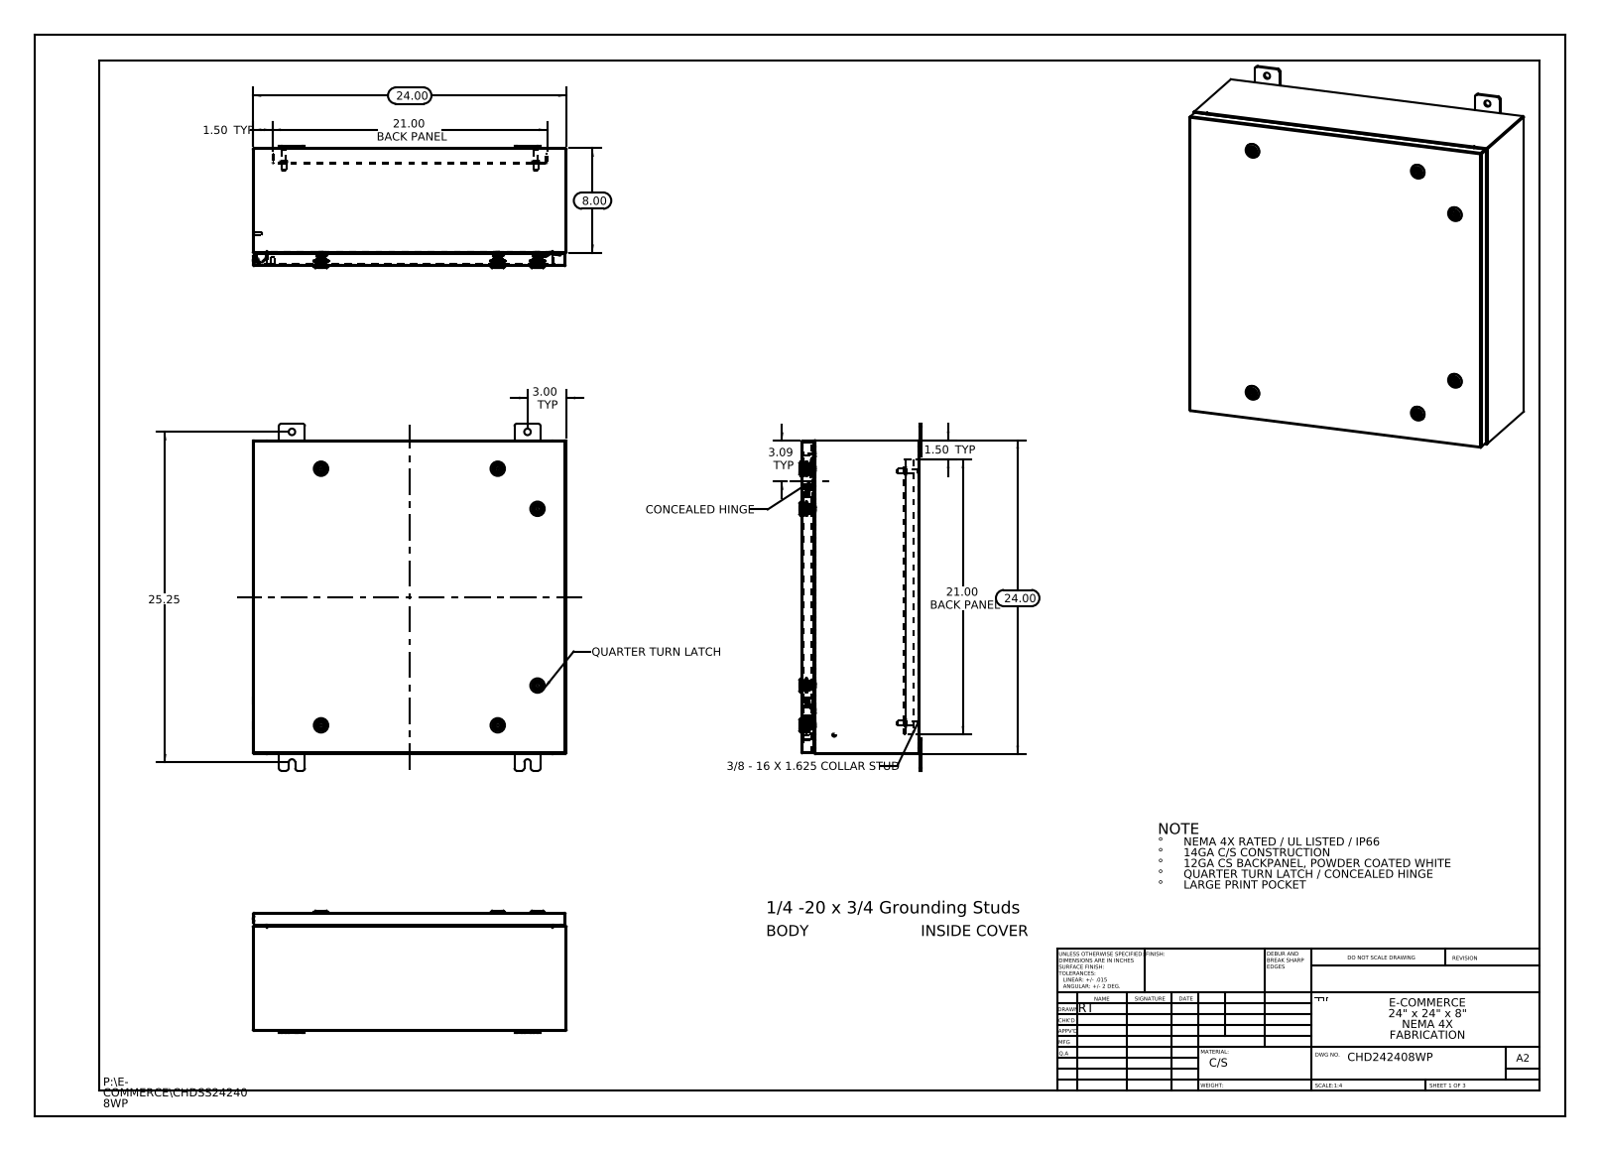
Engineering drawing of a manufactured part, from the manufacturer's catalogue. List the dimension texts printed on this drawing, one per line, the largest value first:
25.25
24.00
24.00
21.00 BACK PANEL
21.00 BACK PANEL
8.00
3.09 TYP
3.00 TYP
1.50 TYP
1.50 TYP
